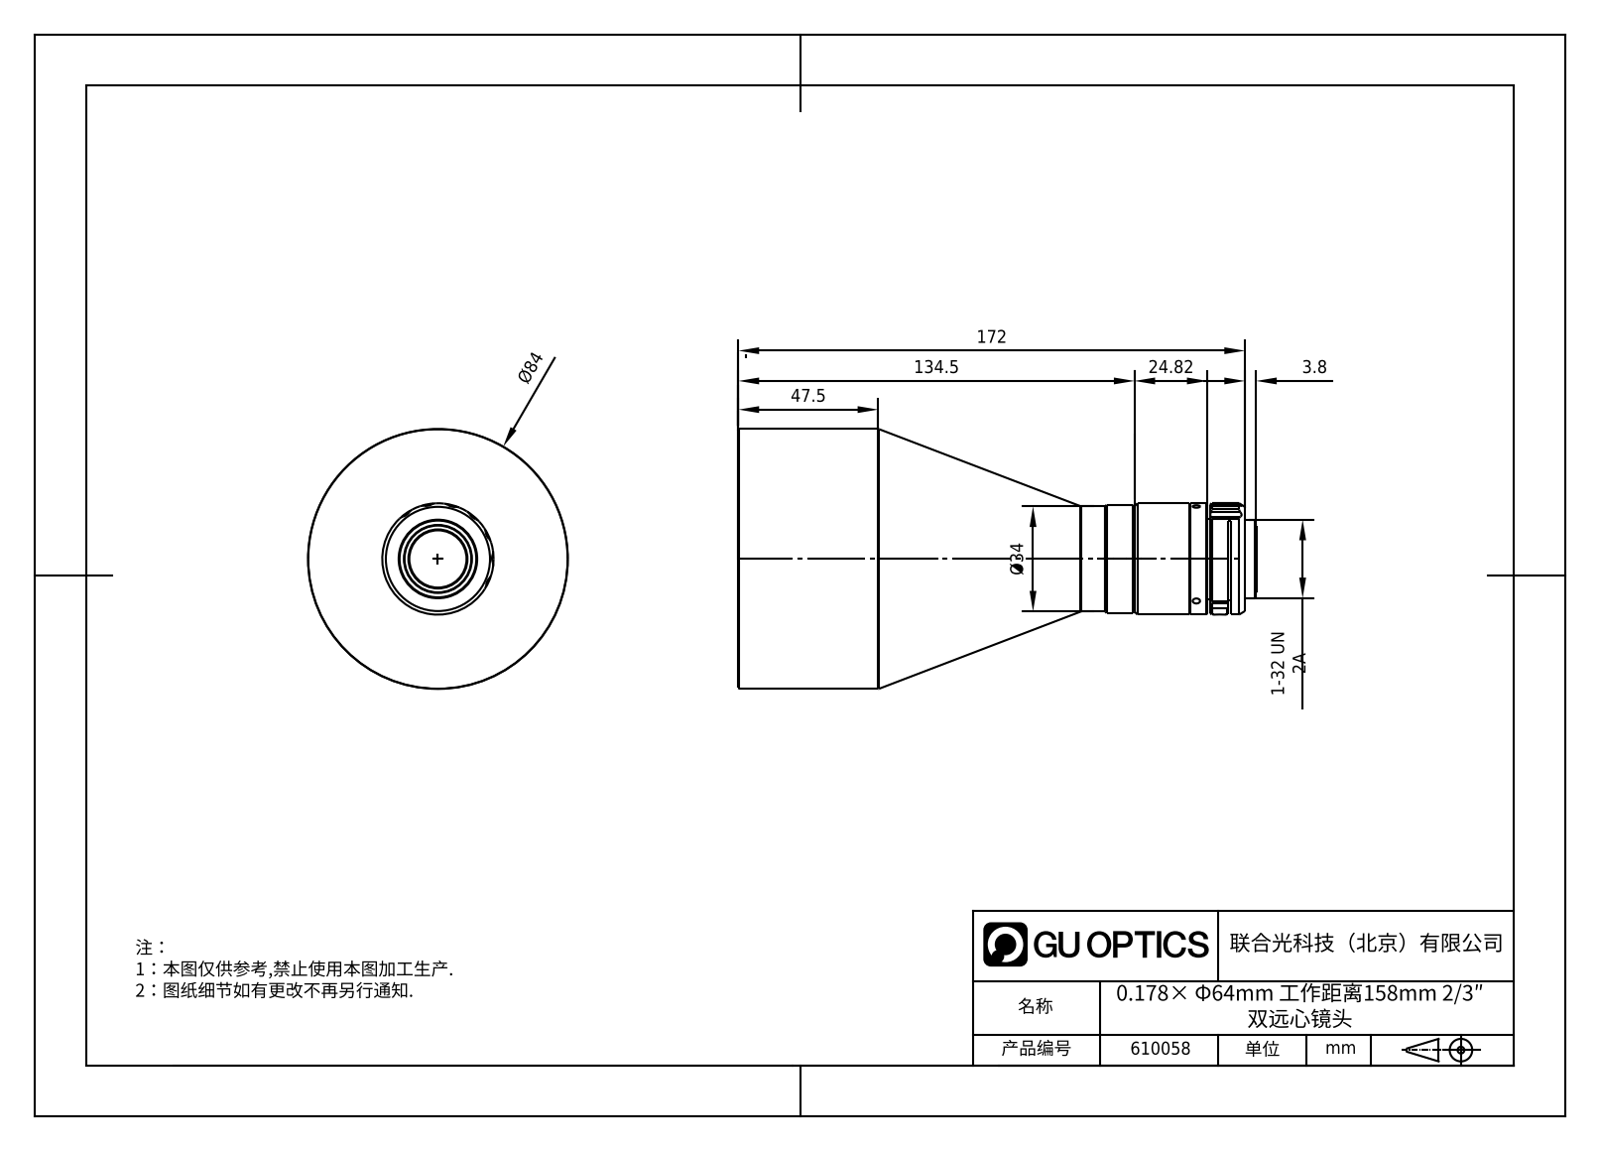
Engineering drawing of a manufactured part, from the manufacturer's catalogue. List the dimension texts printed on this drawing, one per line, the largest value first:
172
134.5
Ø84
47.5
Ø34
24.82
3.8
1-32 UN 2A
